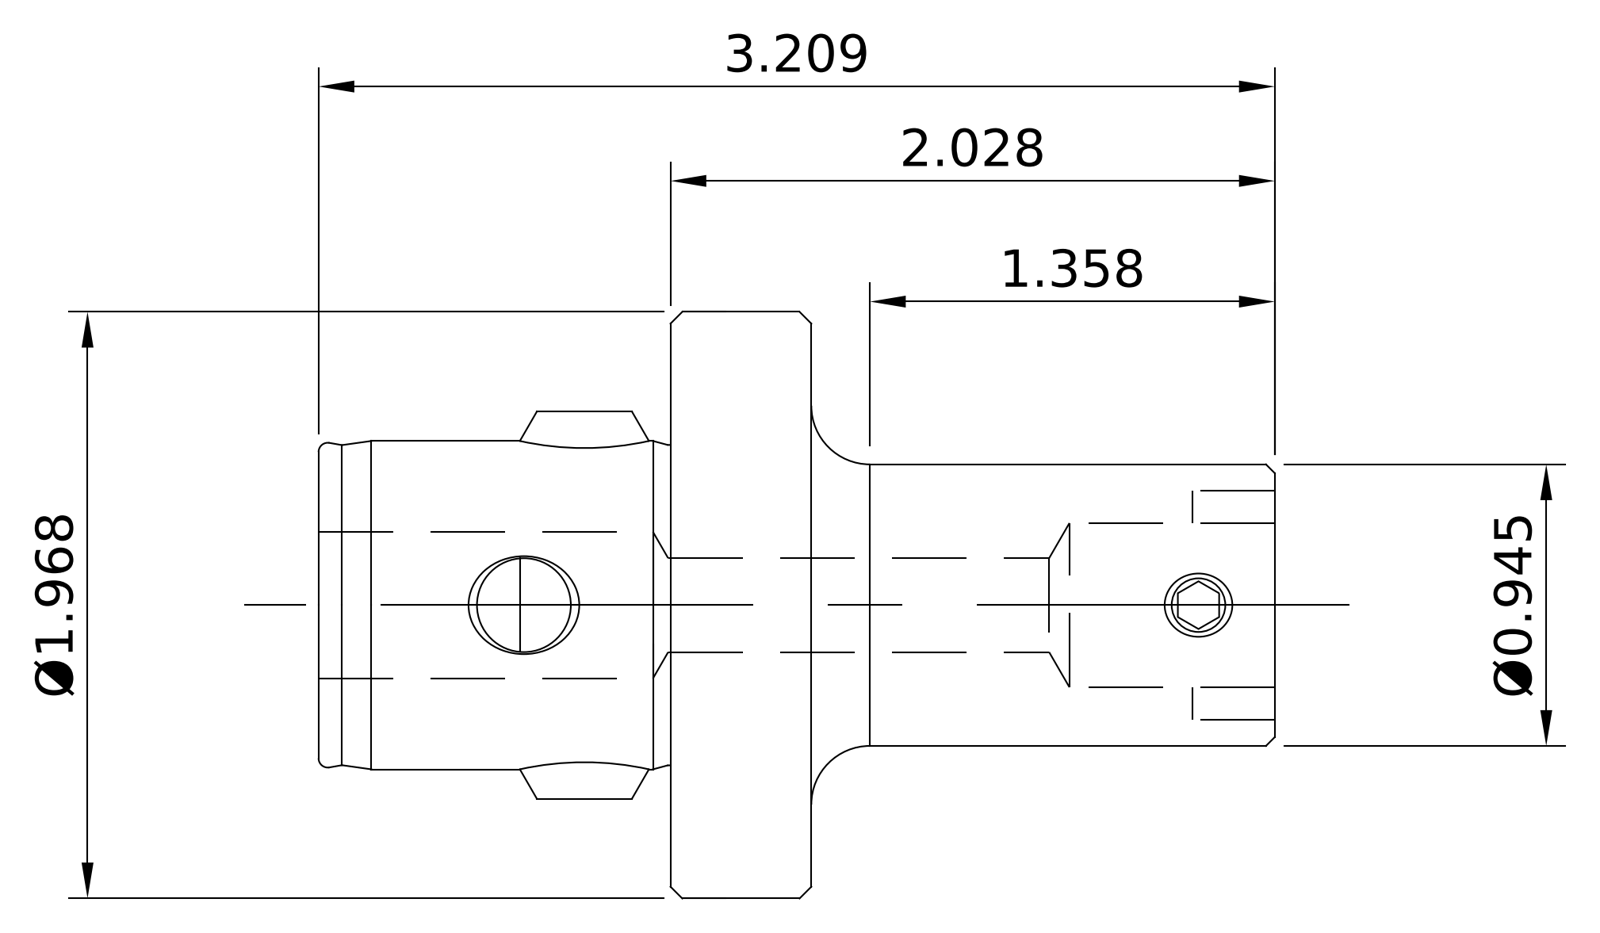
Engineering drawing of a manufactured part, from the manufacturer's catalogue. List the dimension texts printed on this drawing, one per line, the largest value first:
3.209
2.028
Ø1.968
1.358
Ø0.945
